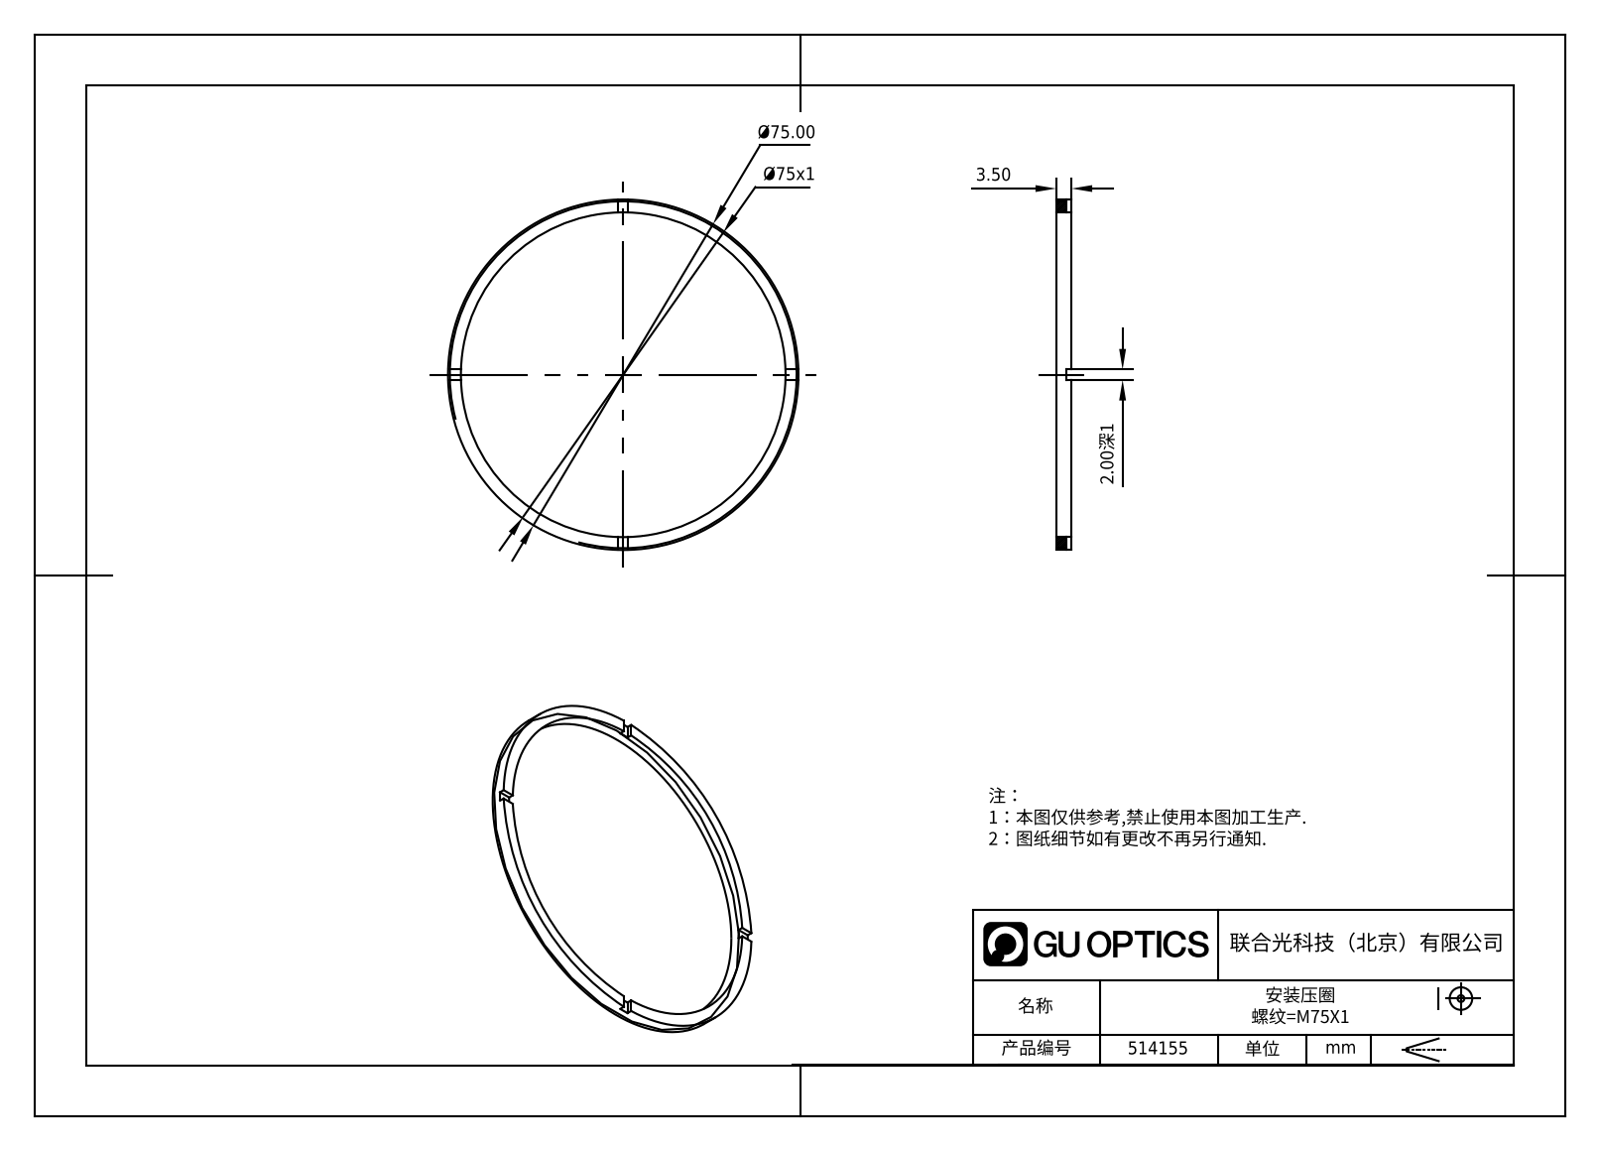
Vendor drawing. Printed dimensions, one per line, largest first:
Ø75.00
Ø75x1
3.50
2.00深1
